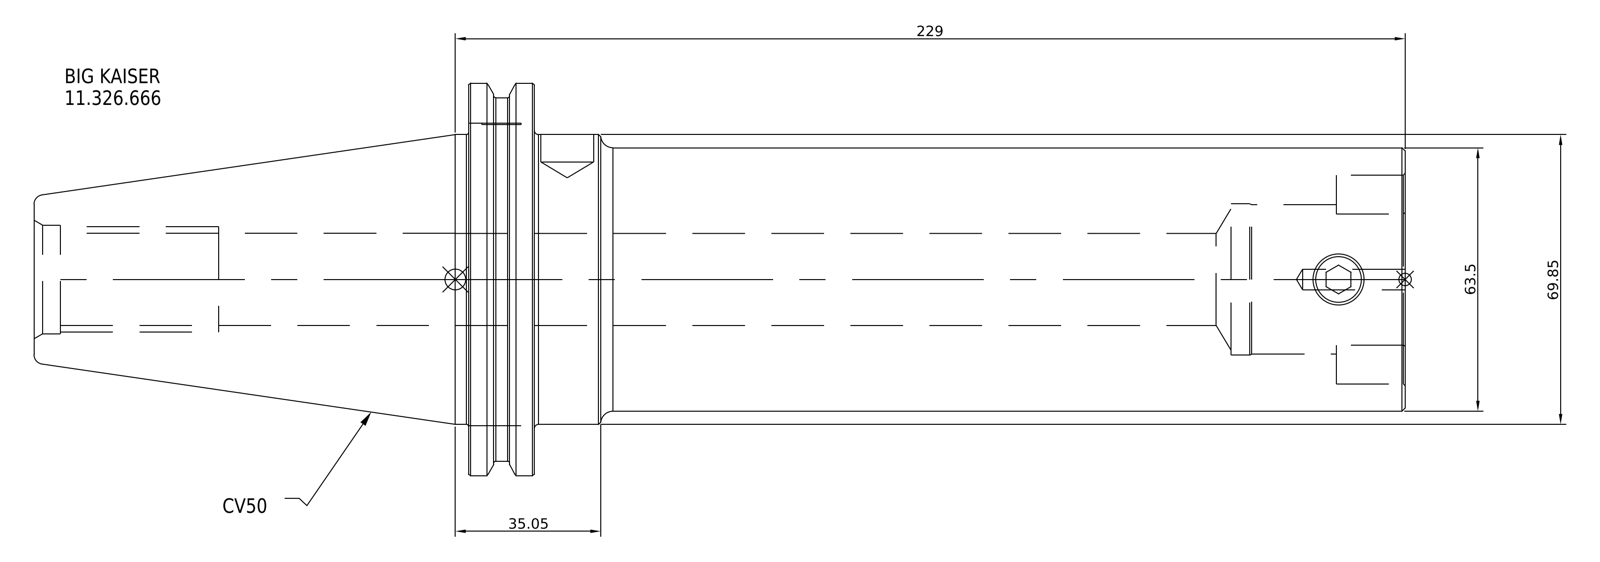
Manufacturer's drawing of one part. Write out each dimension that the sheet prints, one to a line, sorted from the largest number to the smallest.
229
69.85
63.5
35.05
